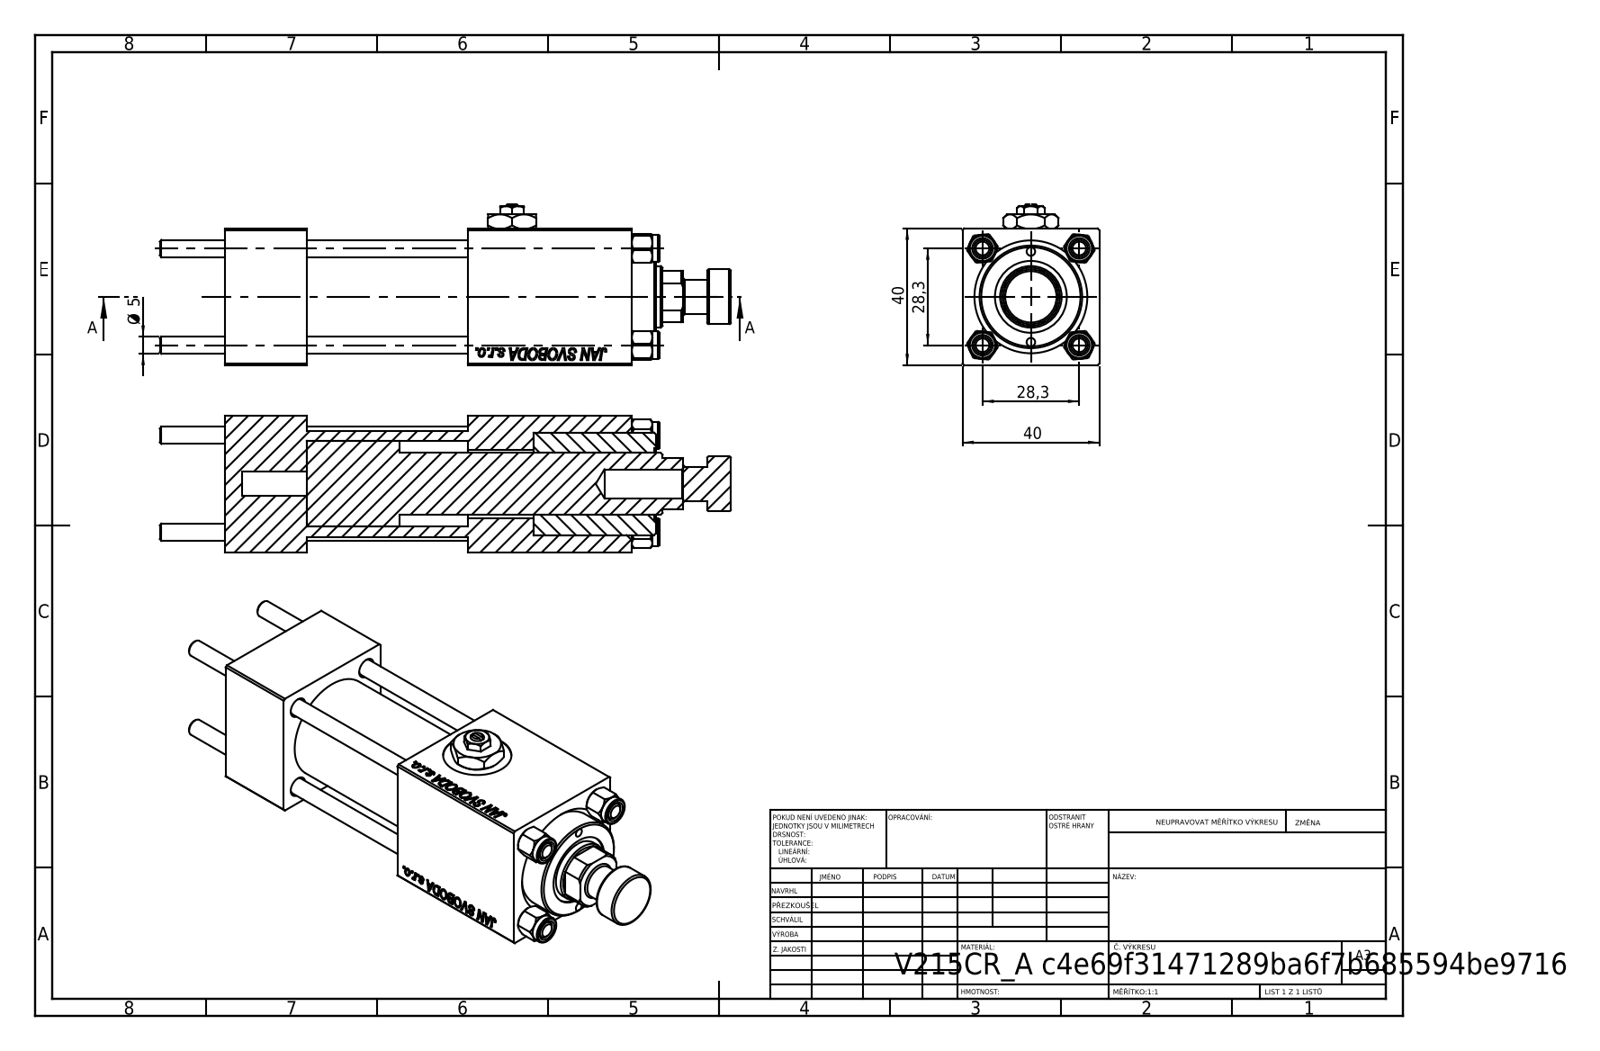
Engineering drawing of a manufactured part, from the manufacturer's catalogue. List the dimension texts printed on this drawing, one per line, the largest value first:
40
40
28,3
28,3
Ø 5
